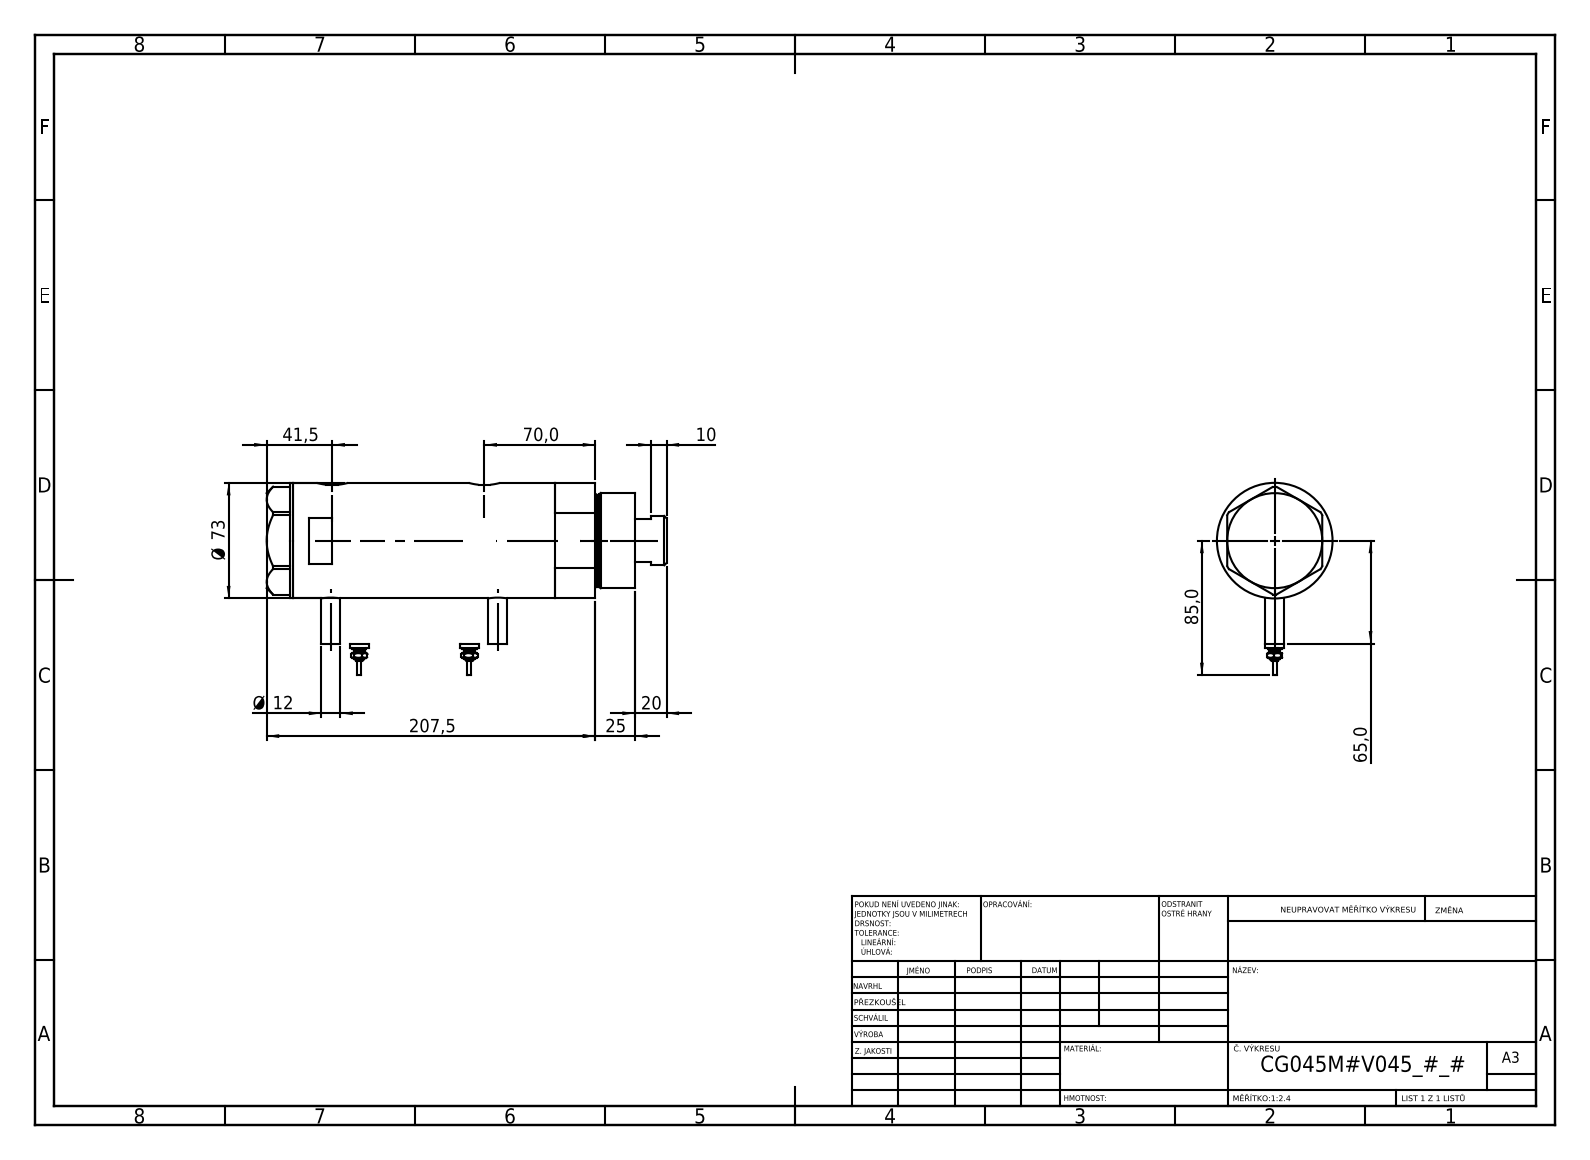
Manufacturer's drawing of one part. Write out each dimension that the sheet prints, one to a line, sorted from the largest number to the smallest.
207,5
85,0
Ø 73
70,0
65,0
41,5
25
20
Ø 12
10
